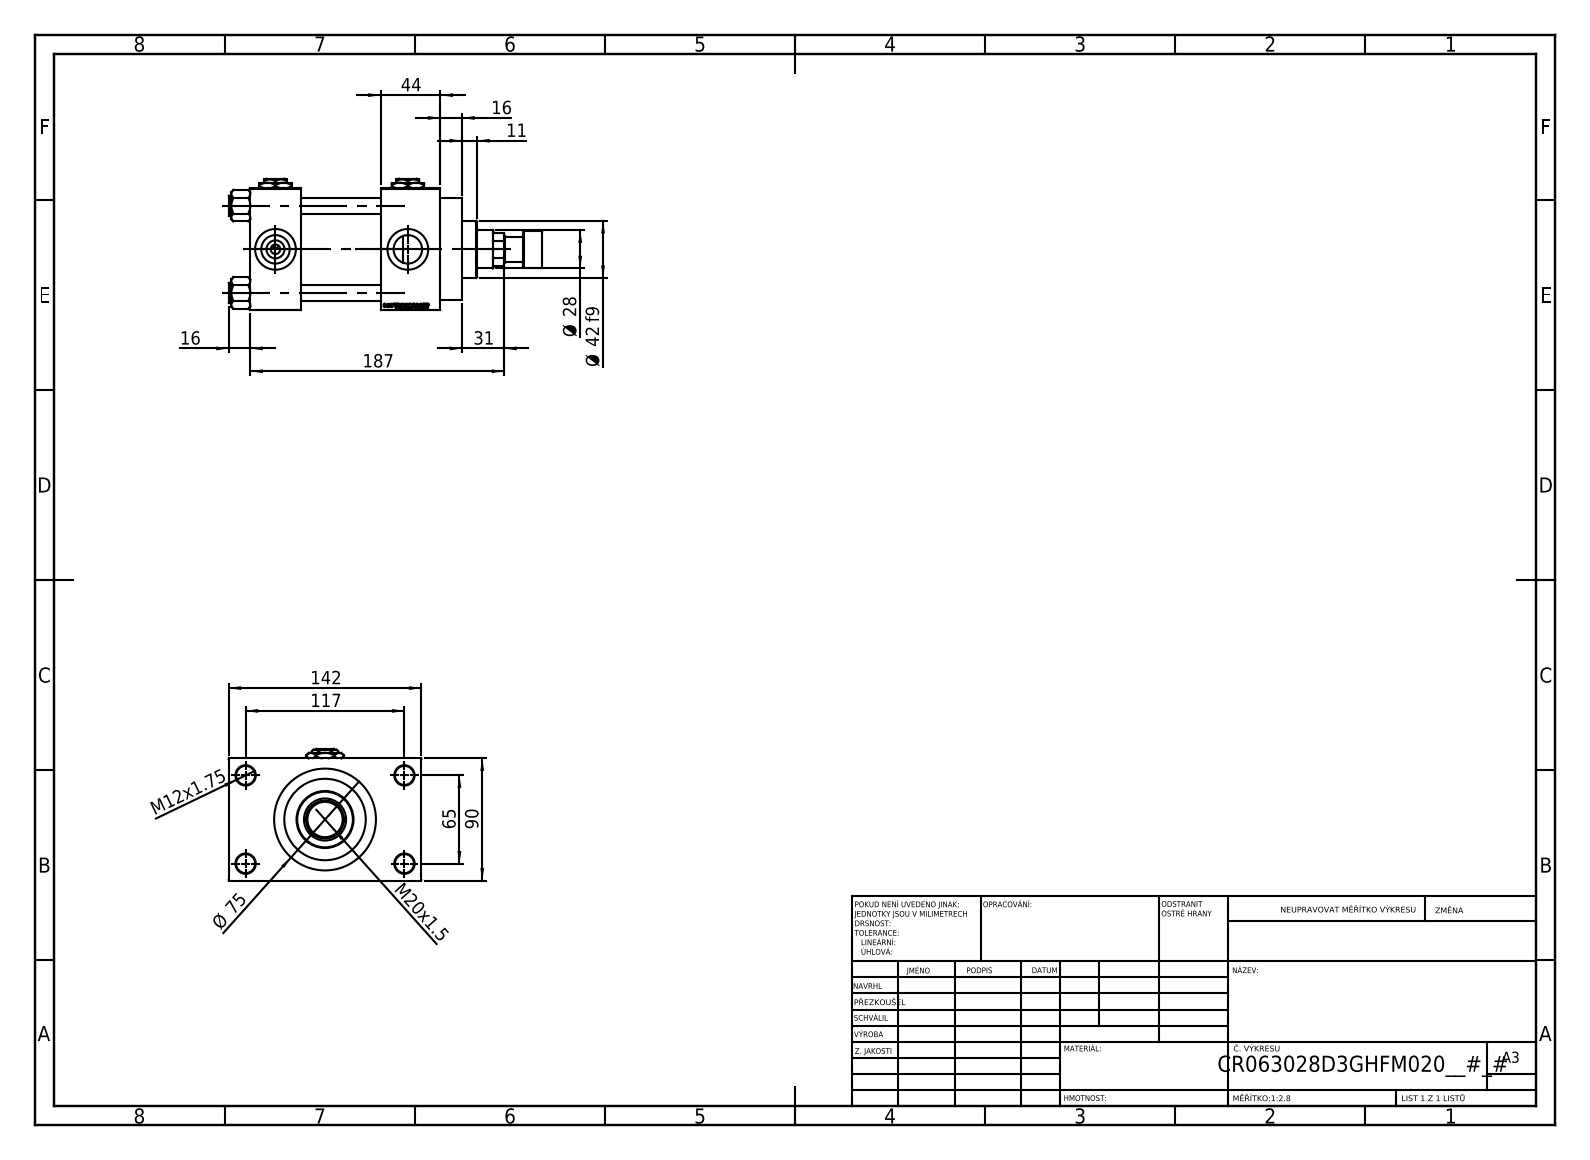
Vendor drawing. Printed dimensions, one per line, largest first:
187
142
117
90
Ø 75
65
44
Ø 42 f9
31
Ø 28
M20x1.5
16
16
M12x1.75
11
